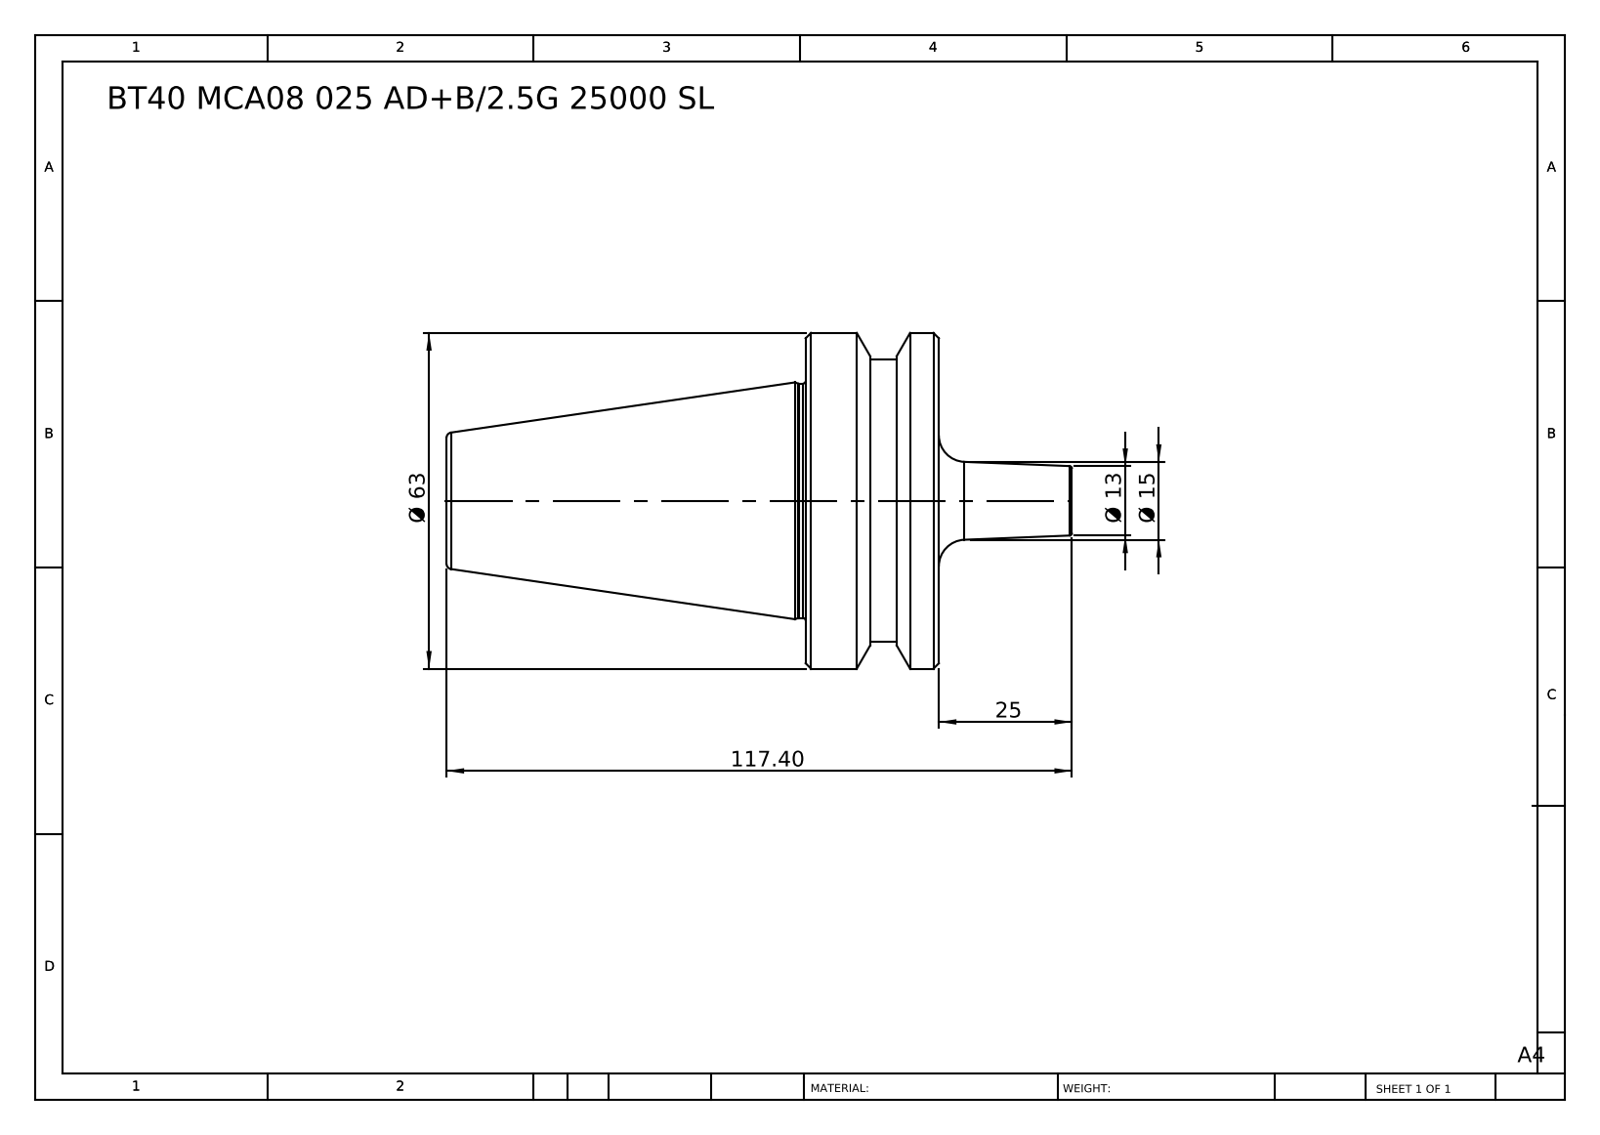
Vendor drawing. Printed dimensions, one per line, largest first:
117.40
Ø 63
25
Ø 15
Ø 13
